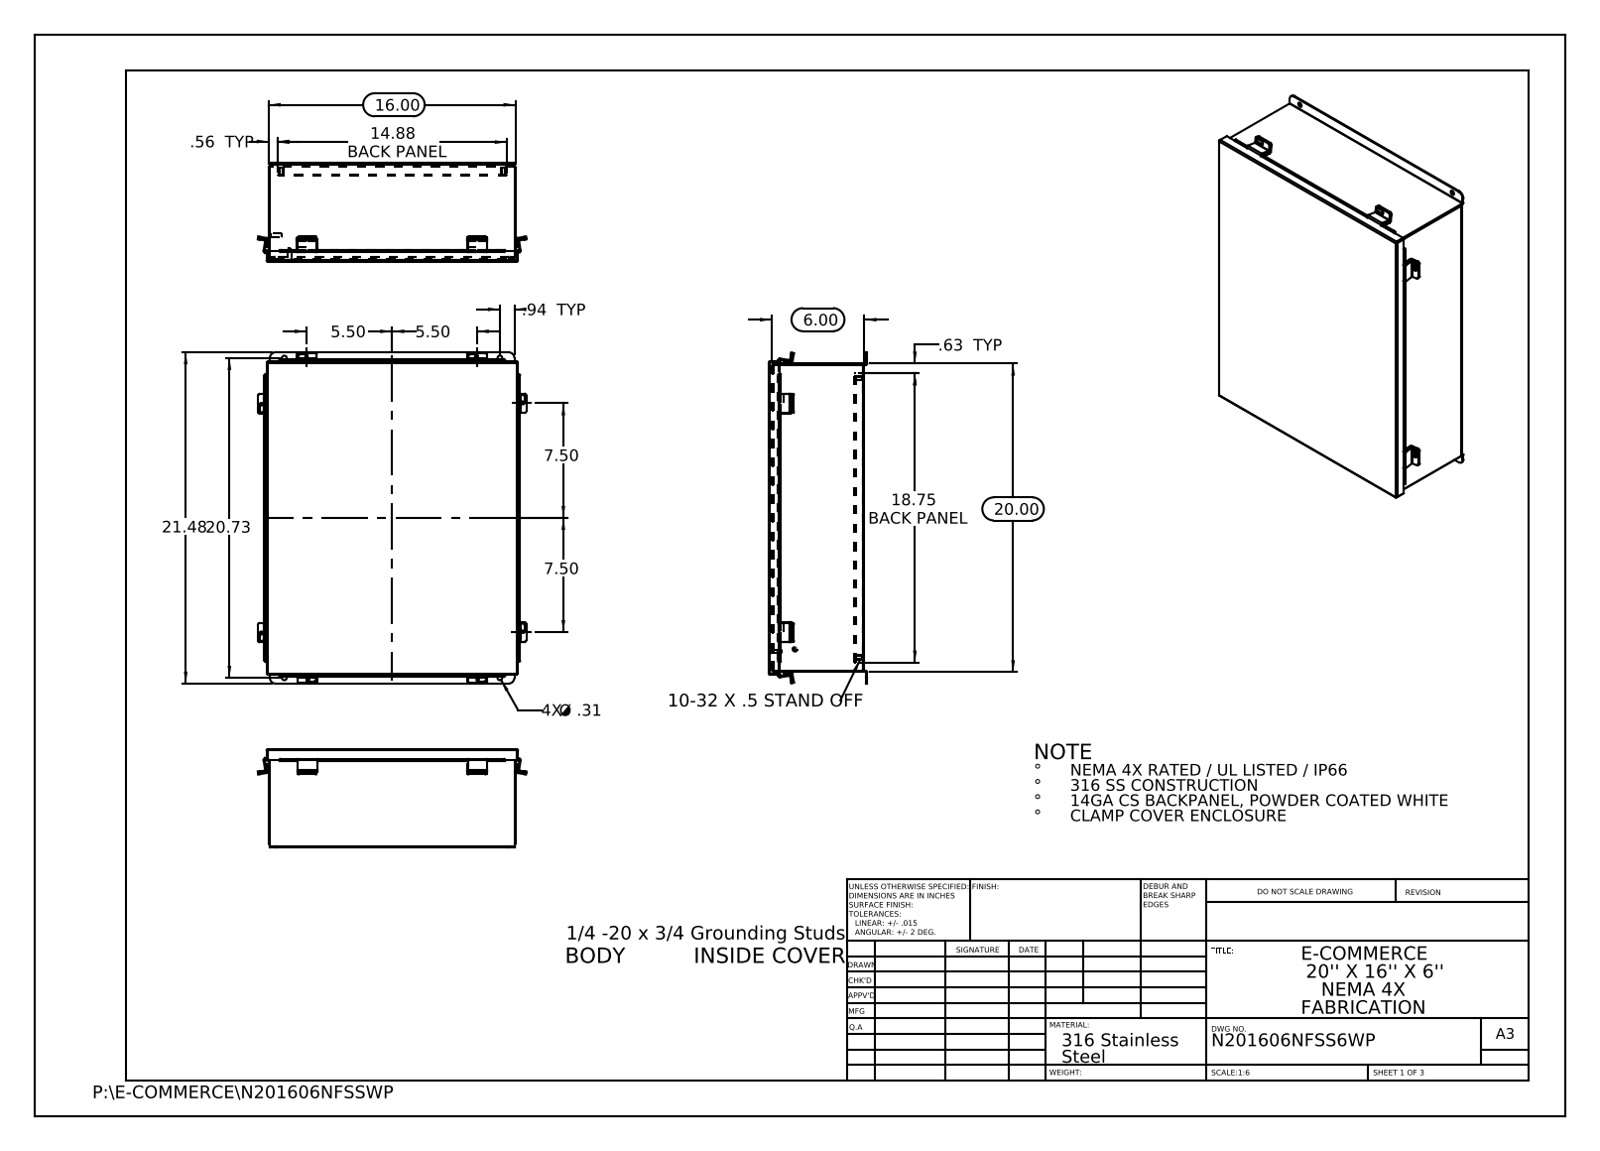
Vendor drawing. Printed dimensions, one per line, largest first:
21.48
20.73
20.00
18.75 BACK PANEL
16.00
14.88 BACK PANEL
7.50
7.50
6.00
5.50
5.50
.94 TYP
.63 TYP
.56 TYP
4X Ø .31
